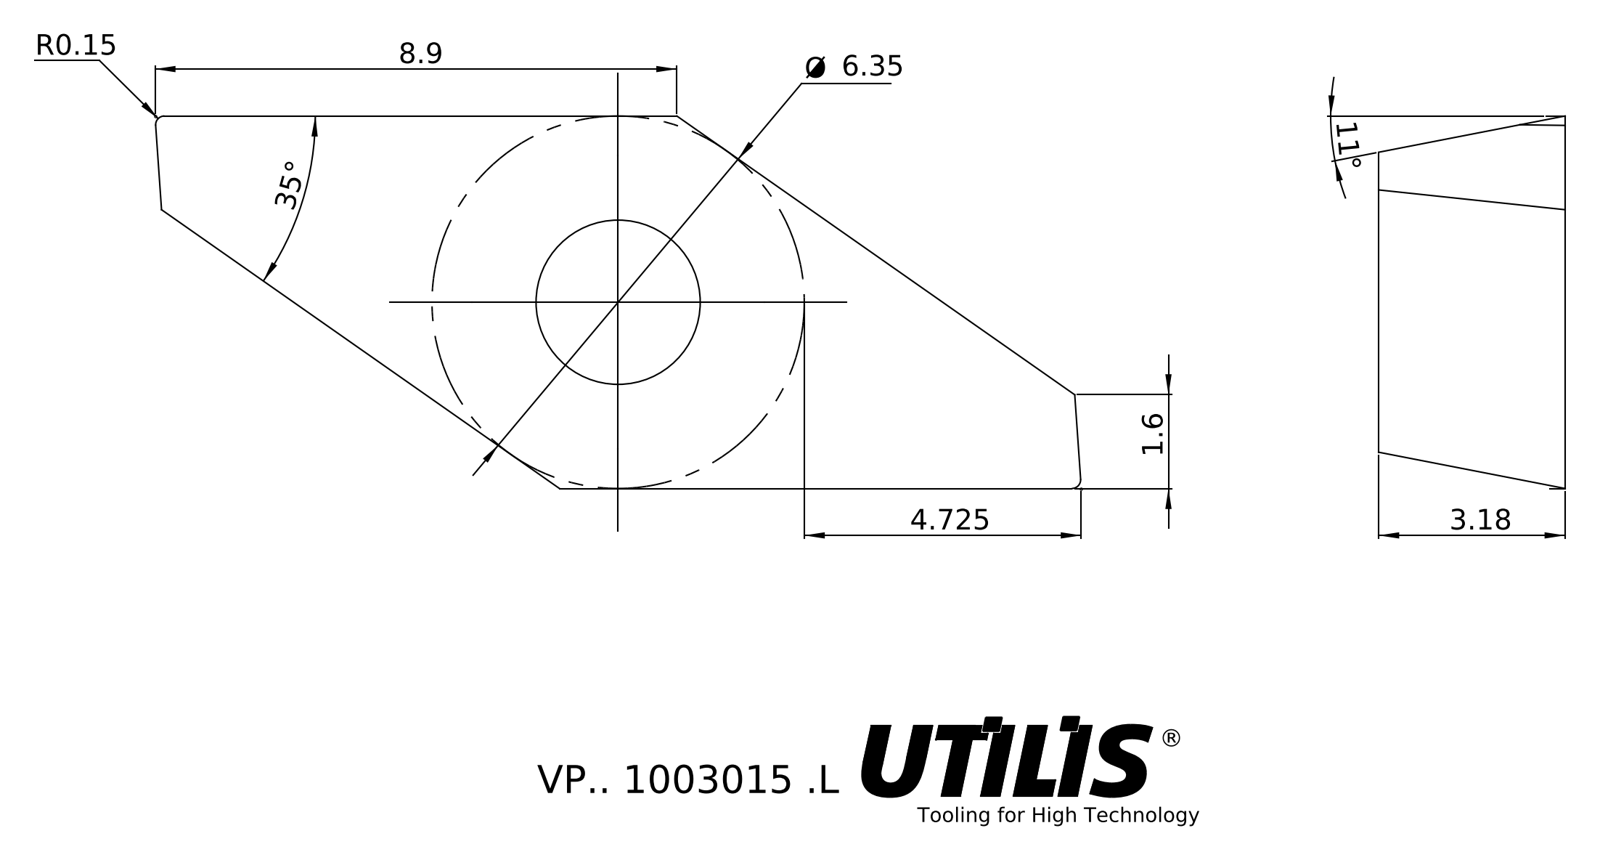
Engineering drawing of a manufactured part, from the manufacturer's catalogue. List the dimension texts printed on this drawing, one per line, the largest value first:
35°
11°
8.9
Ø 6.35
4.725
3.18
1.6
R0.15
